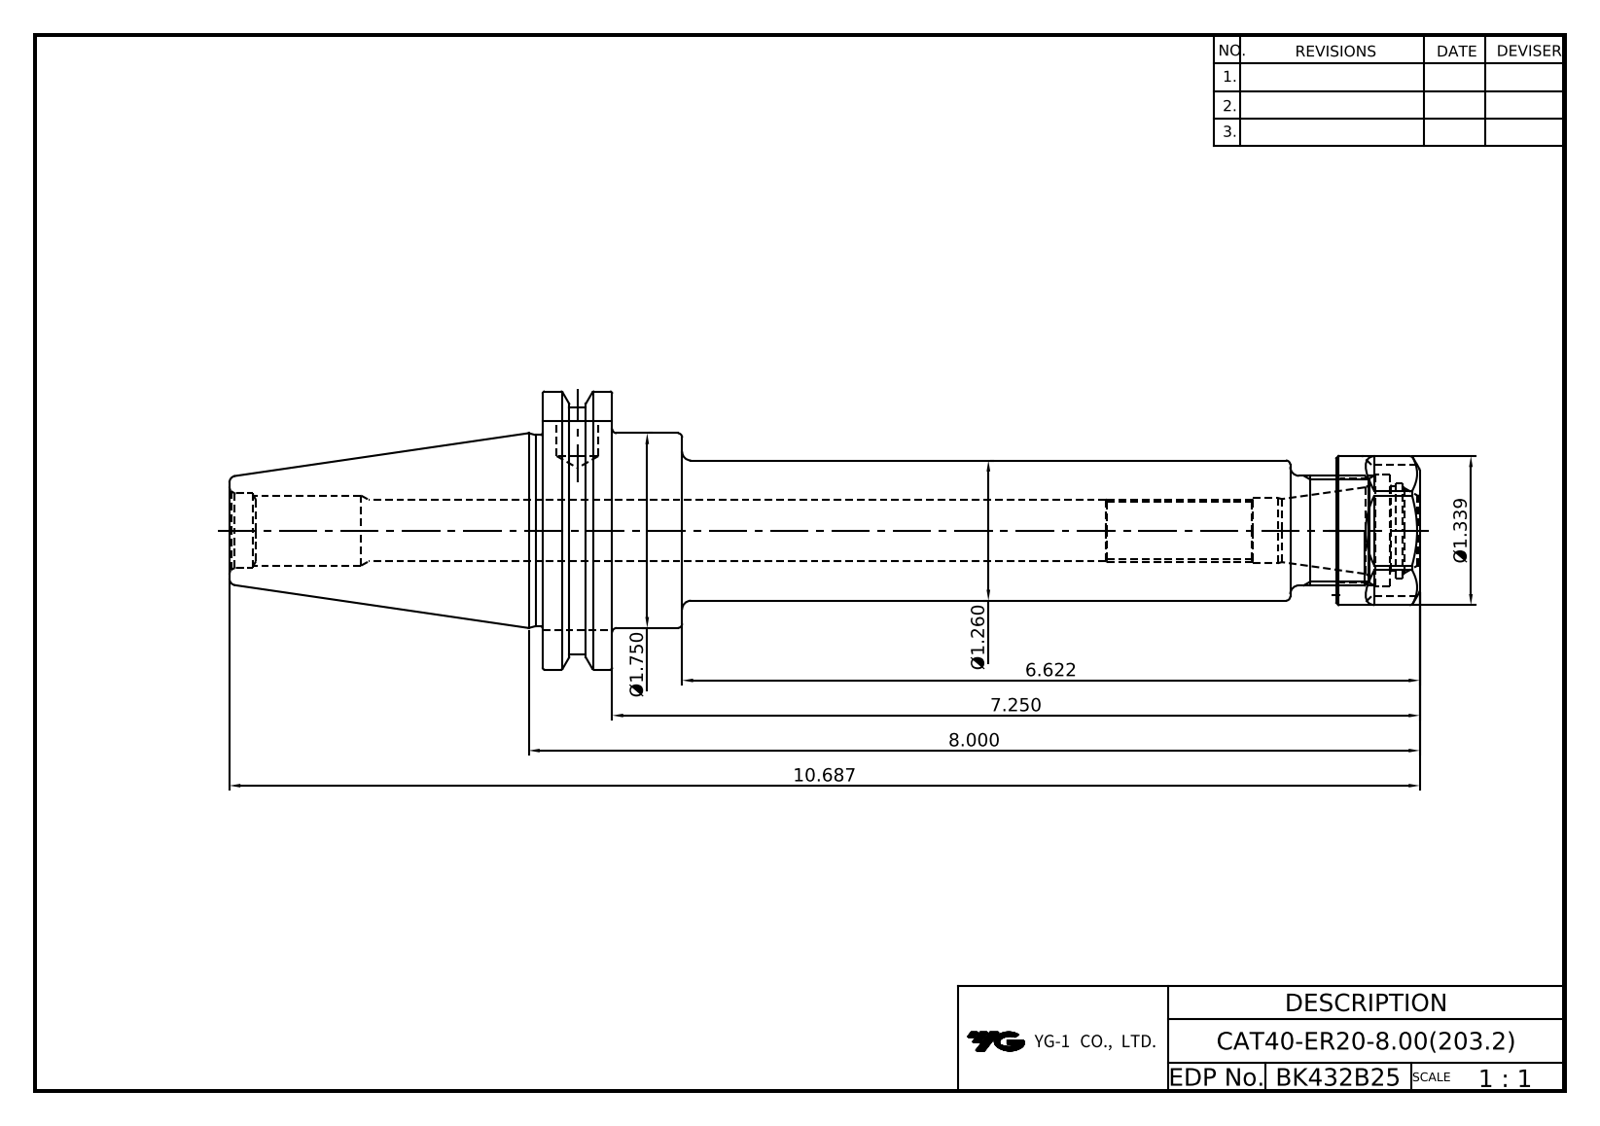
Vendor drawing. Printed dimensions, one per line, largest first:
10.687
8.000
7.250
6.622
Ø1.750
Ø1.339
Ø1.260
